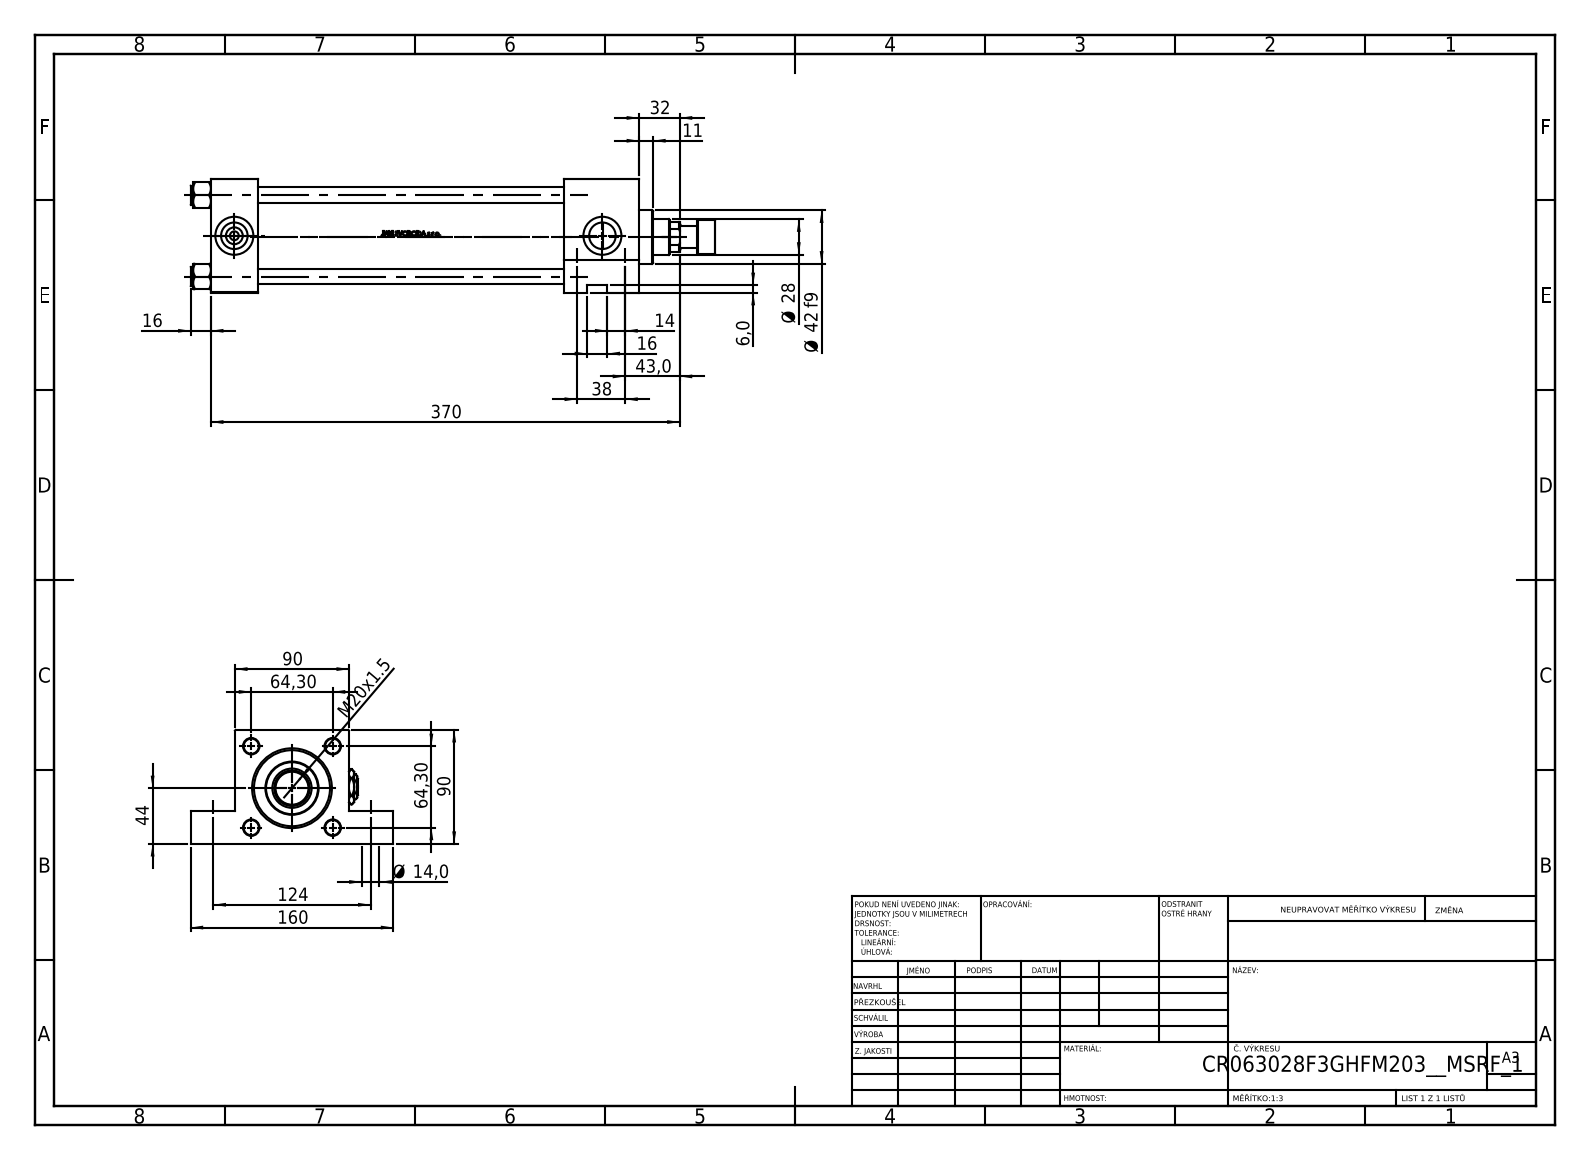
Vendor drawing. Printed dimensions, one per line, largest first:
370
160
124
90
90
64,30
64,30
44
43,0
Ø 42 f9
38
32
Ø 28
M20x1.5
16
16
14
Ø 14,0
11
6,0
